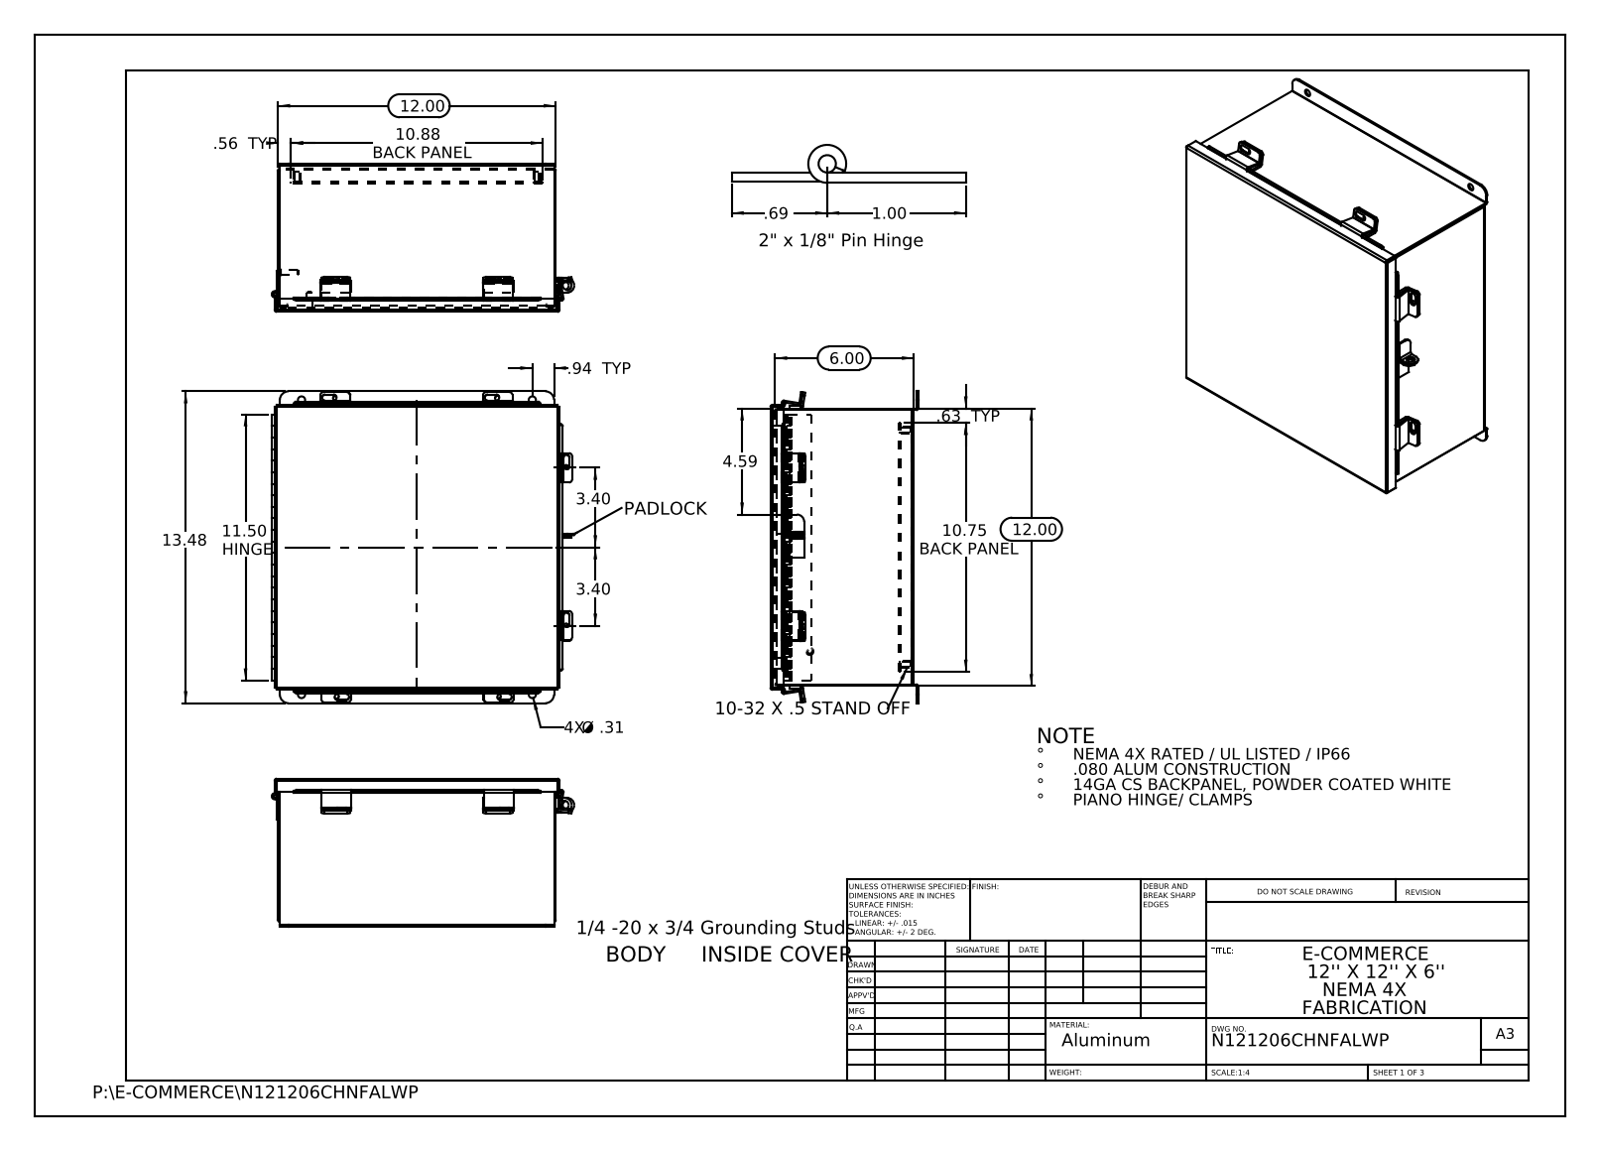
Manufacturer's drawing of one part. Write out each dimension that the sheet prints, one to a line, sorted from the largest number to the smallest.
13.48
12.00
12.00
11.50 HINGE
10.88 BACK PANEL
10.75 BACK PANEL
6.00
4.59
3.40
3.40
1.00
.94 TYP
.69
.63 TYP
.56 TYP
4X Ø .31
